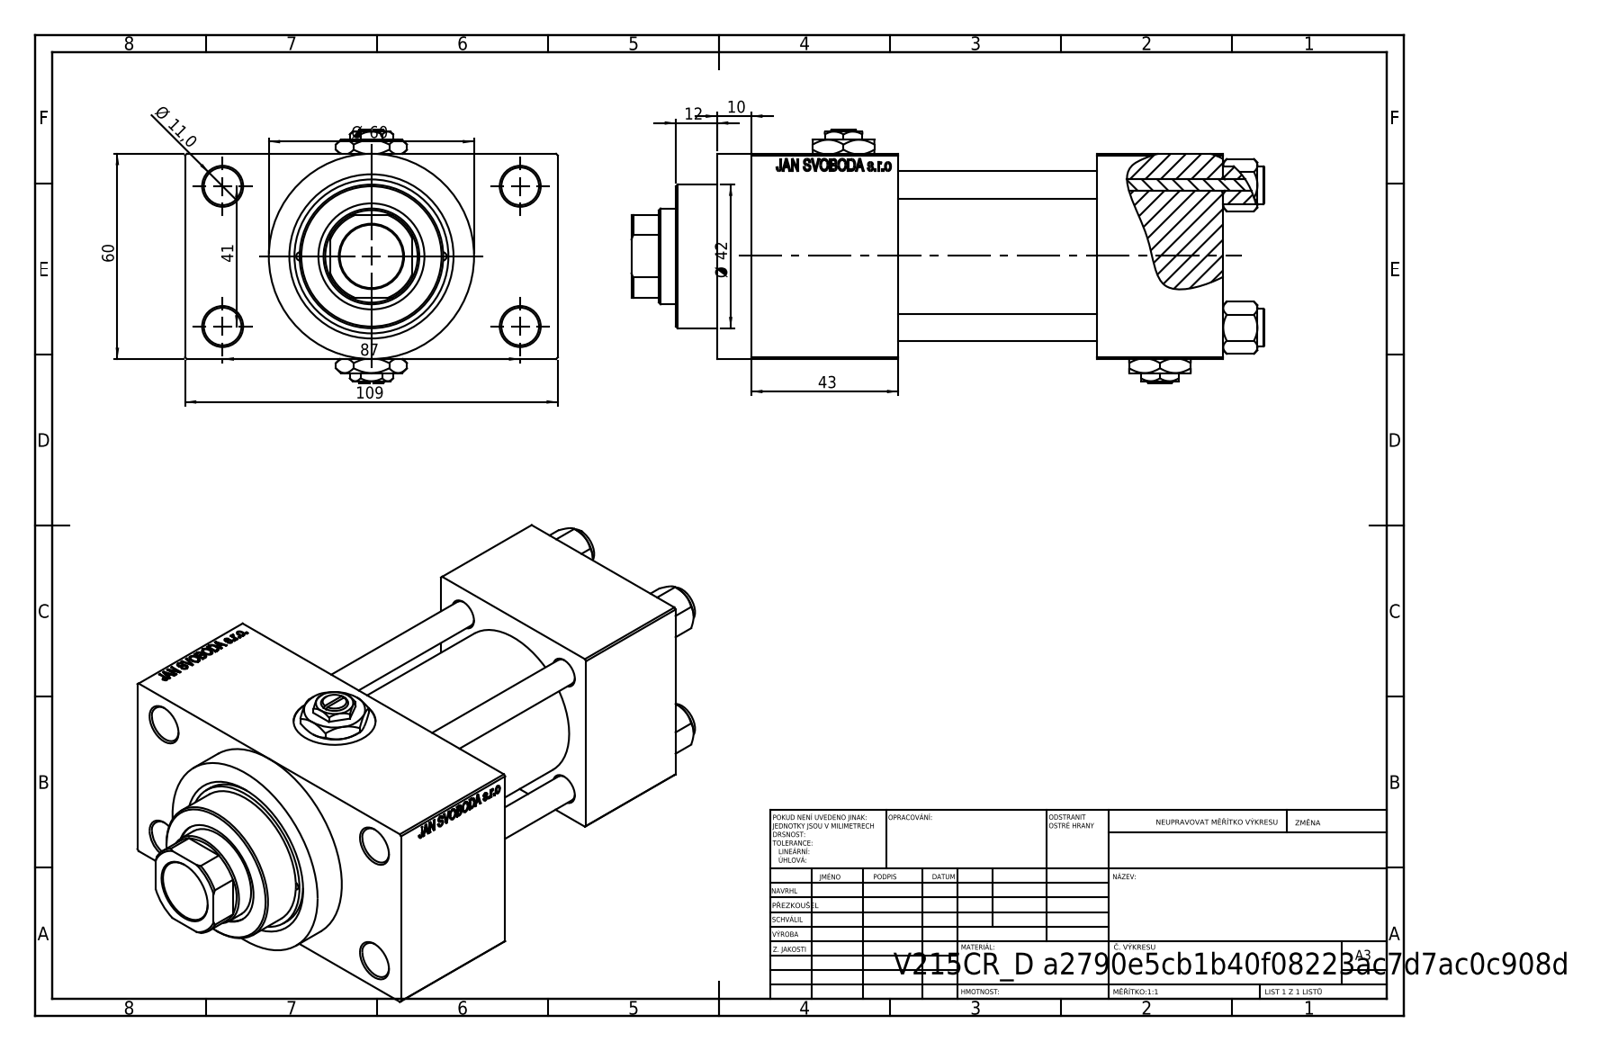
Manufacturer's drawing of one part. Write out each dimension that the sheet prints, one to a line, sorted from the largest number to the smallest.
109
87
60
Ø 60
43
Ø 42
41
12
Ø 11,0
10
